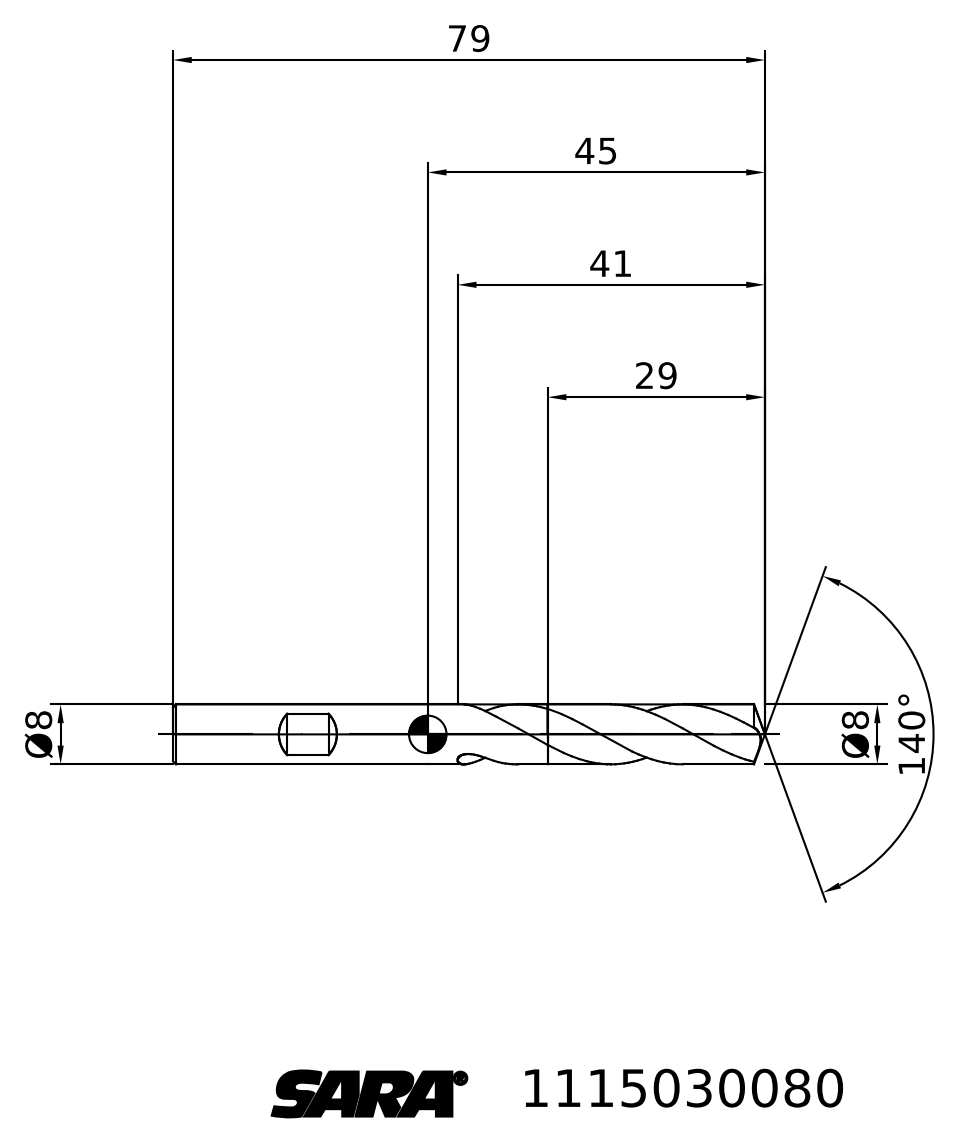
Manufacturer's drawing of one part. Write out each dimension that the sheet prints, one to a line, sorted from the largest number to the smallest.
140°
79
45
41
29
Ø8
Ø8
